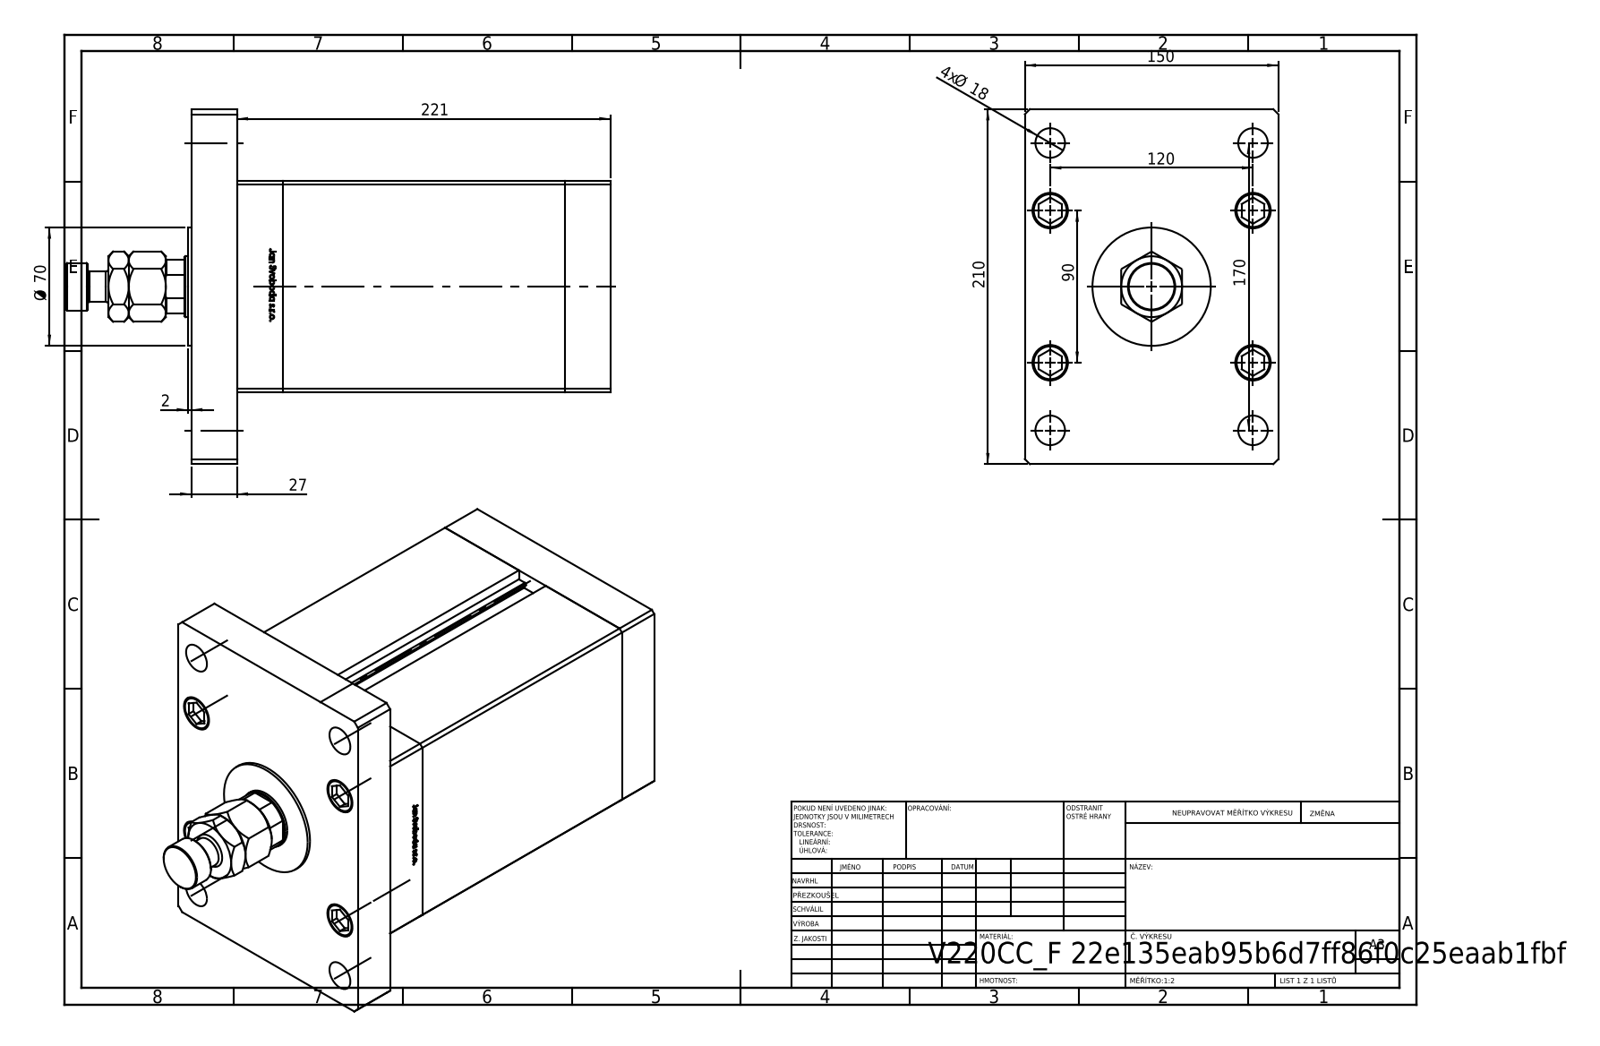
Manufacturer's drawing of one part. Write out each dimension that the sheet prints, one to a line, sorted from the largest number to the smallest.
221
210
170
150
120
90
Ø 70
27
4x Ø 18
2
